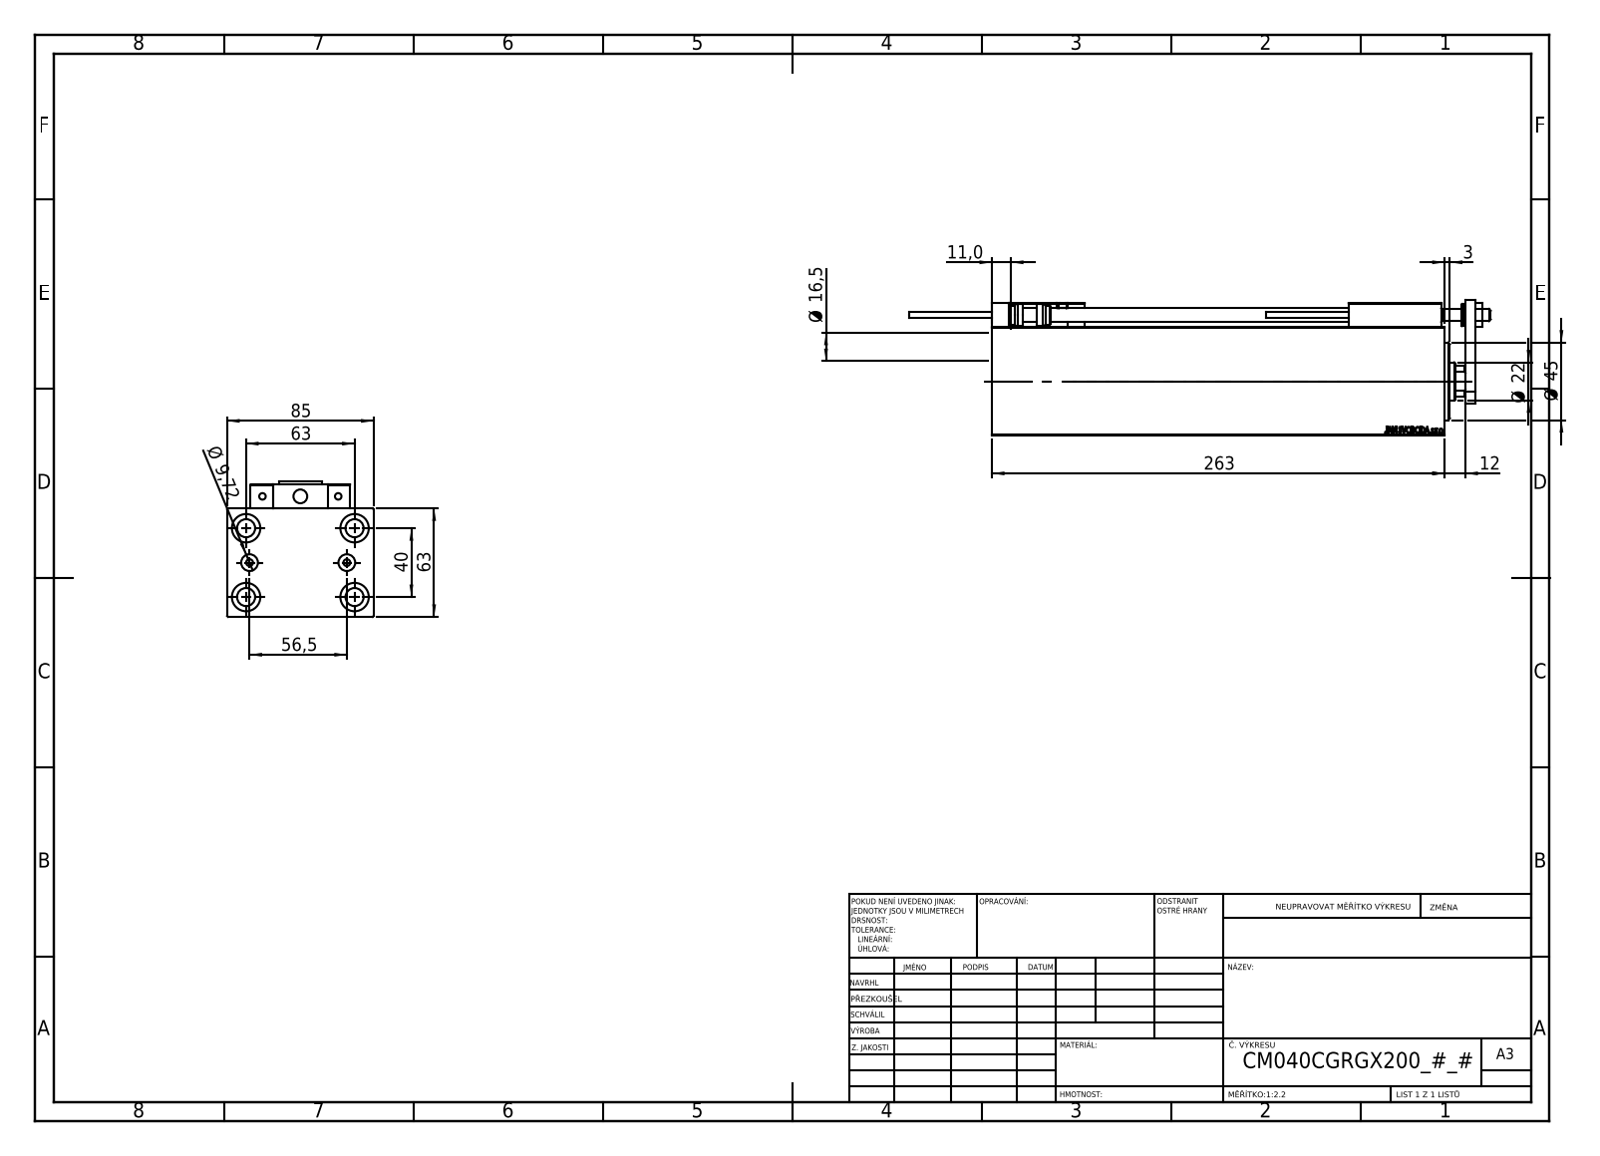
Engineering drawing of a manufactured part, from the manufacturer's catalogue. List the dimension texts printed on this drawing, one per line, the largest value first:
263
85
63
63
56,5
Ø 45
40
Ø 22
Ø 16,5
12
11,0
Ø 9,72
3
